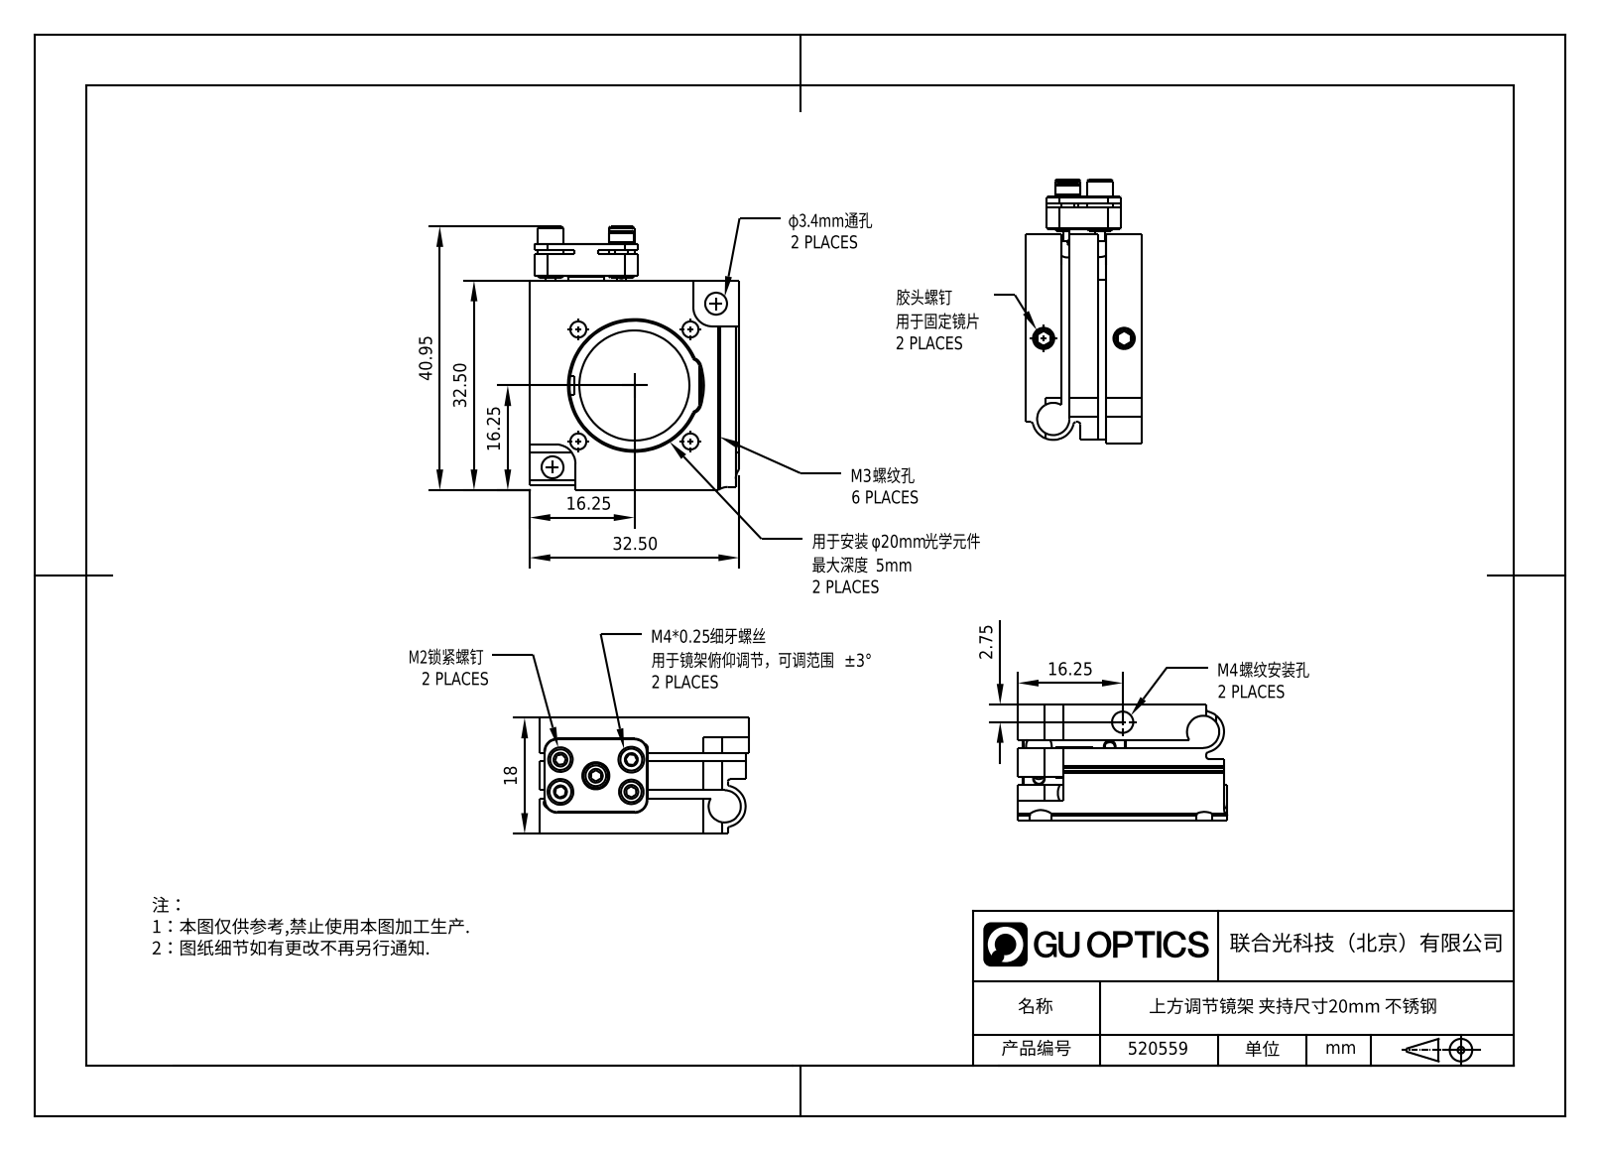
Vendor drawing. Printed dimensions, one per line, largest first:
40.95
32.50
32.50
18
16.25
16.25
16.25
2.75
